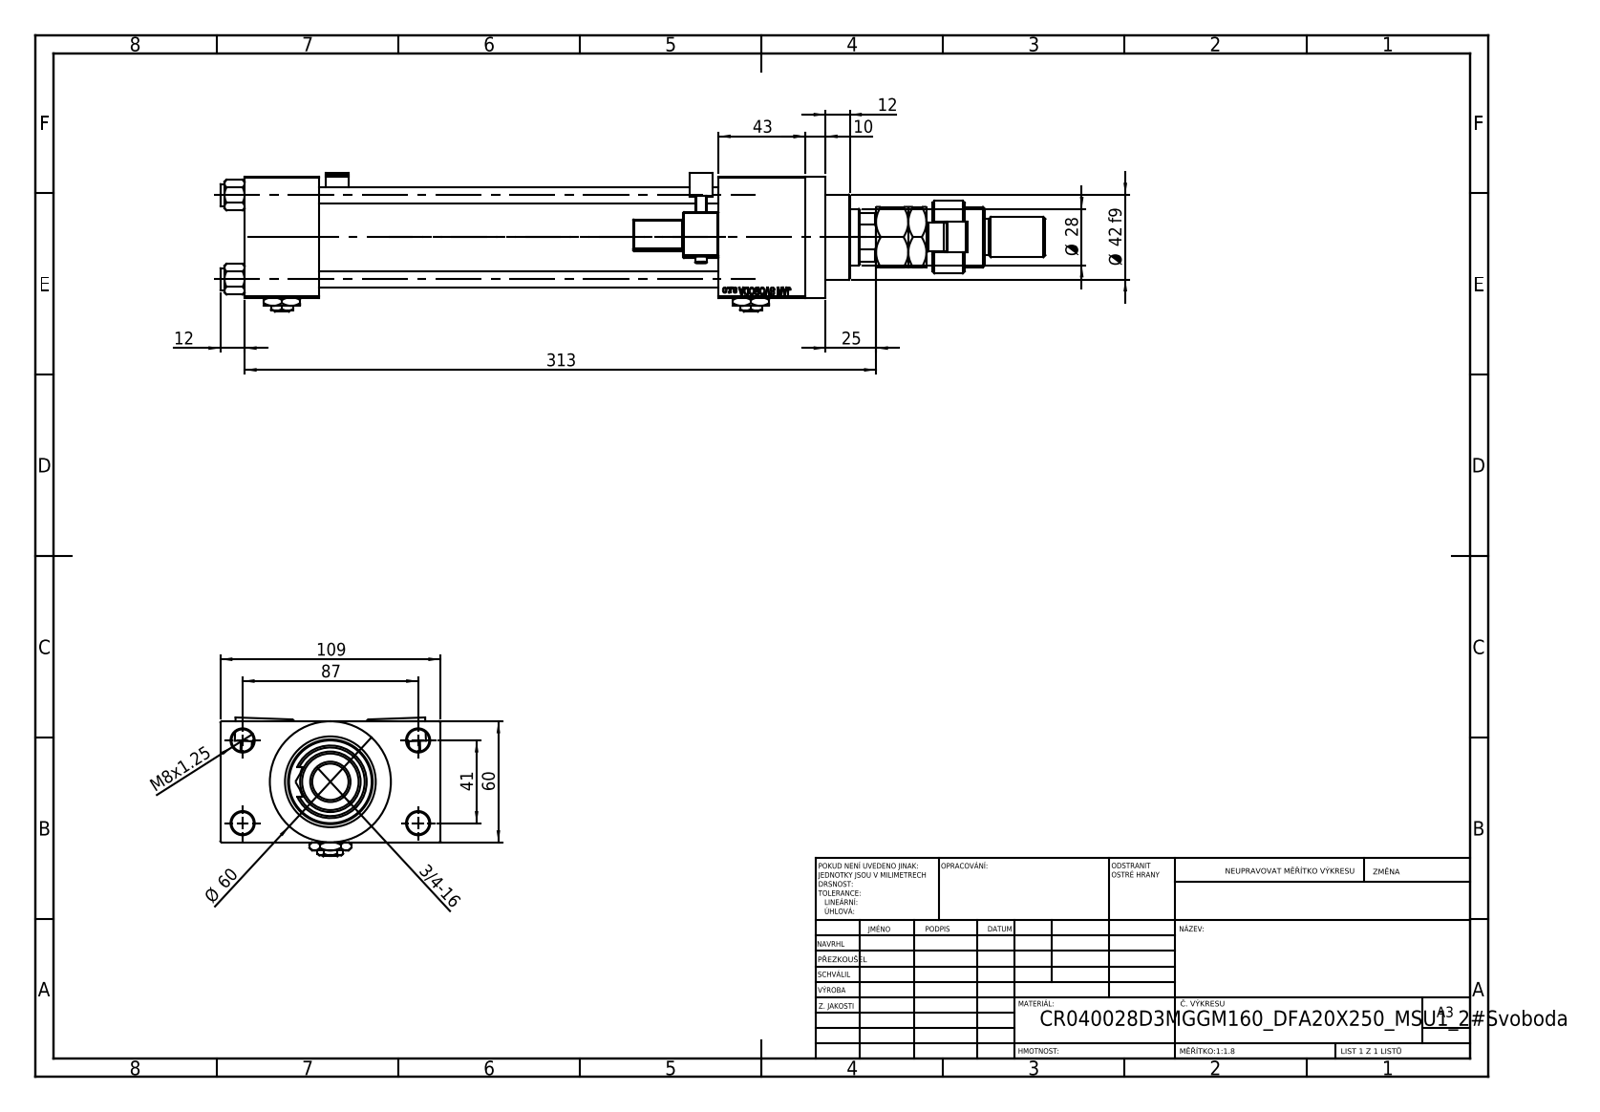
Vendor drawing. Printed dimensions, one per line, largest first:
313
109
87
Ø 60
60
43
Ø 42 f9
41
Ø 28
25
12
12
10
M8x1.25
3/4-16
